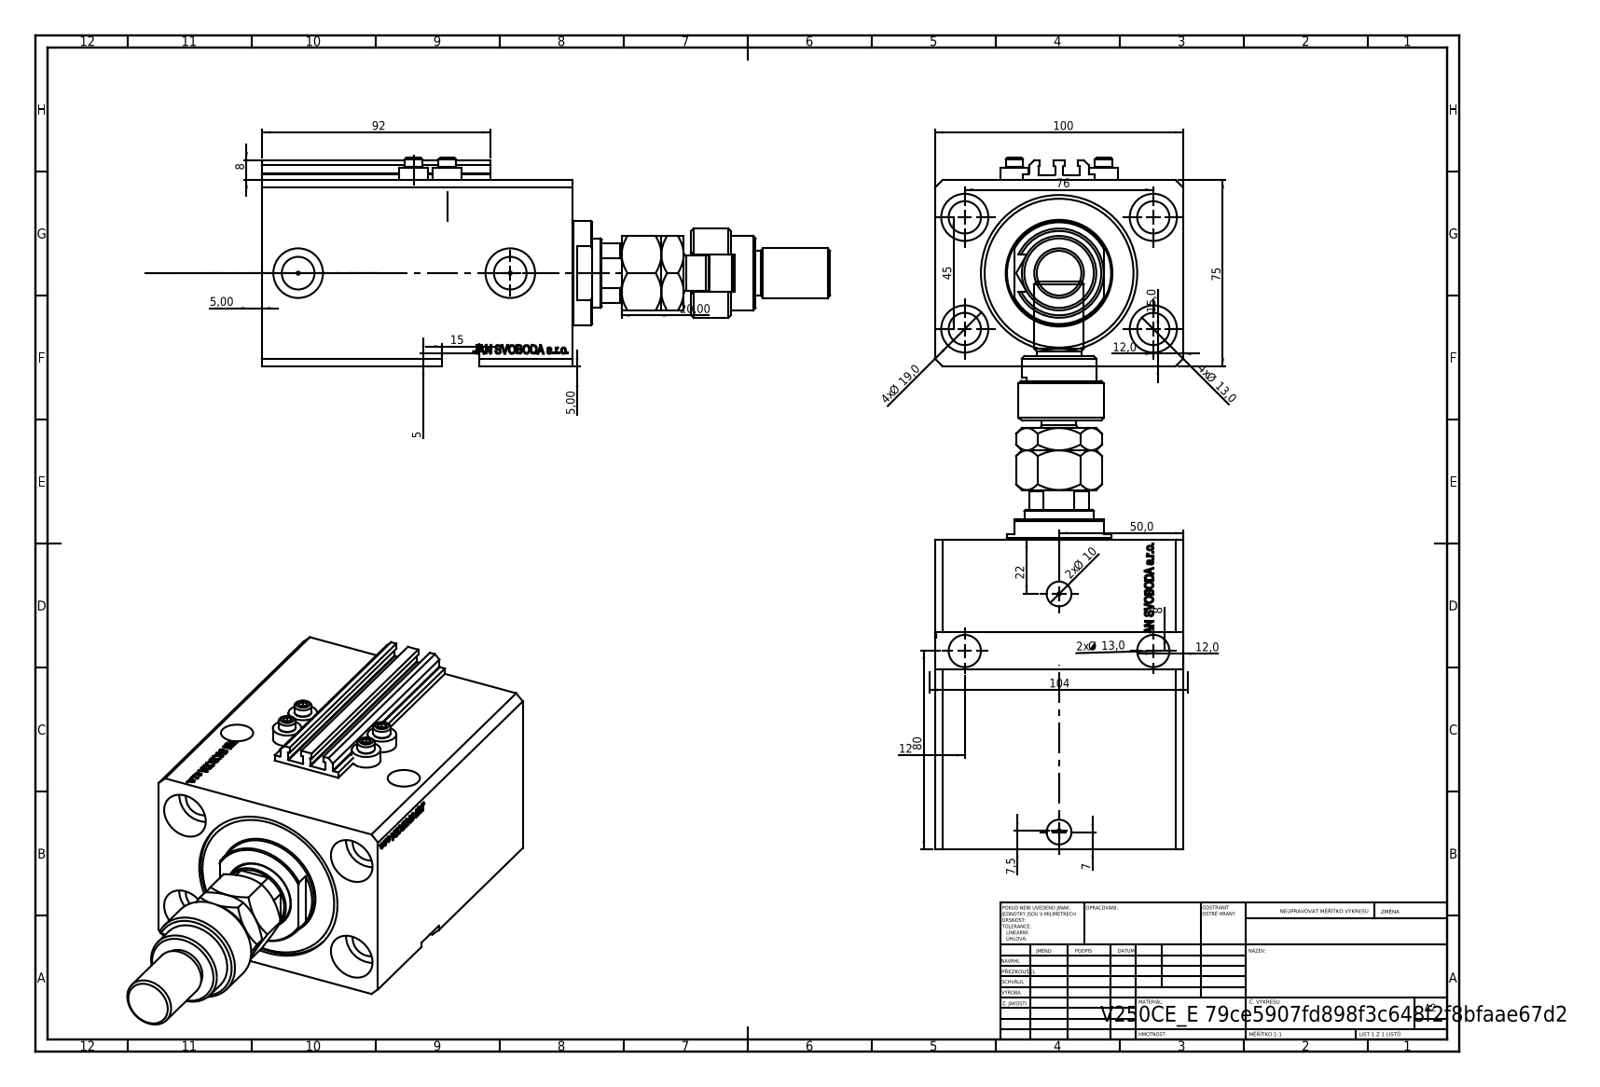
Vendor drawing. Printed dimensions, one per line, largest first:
104
100
92
80
76
75
50,0
45
22
20,00
4x Ø 19,0
15,0
15
4x Ø 13,0
2x Ø 13,0
12,0
12,0
12
2x Ø 10
8
8
7,5
7
5,00
5,00
5
